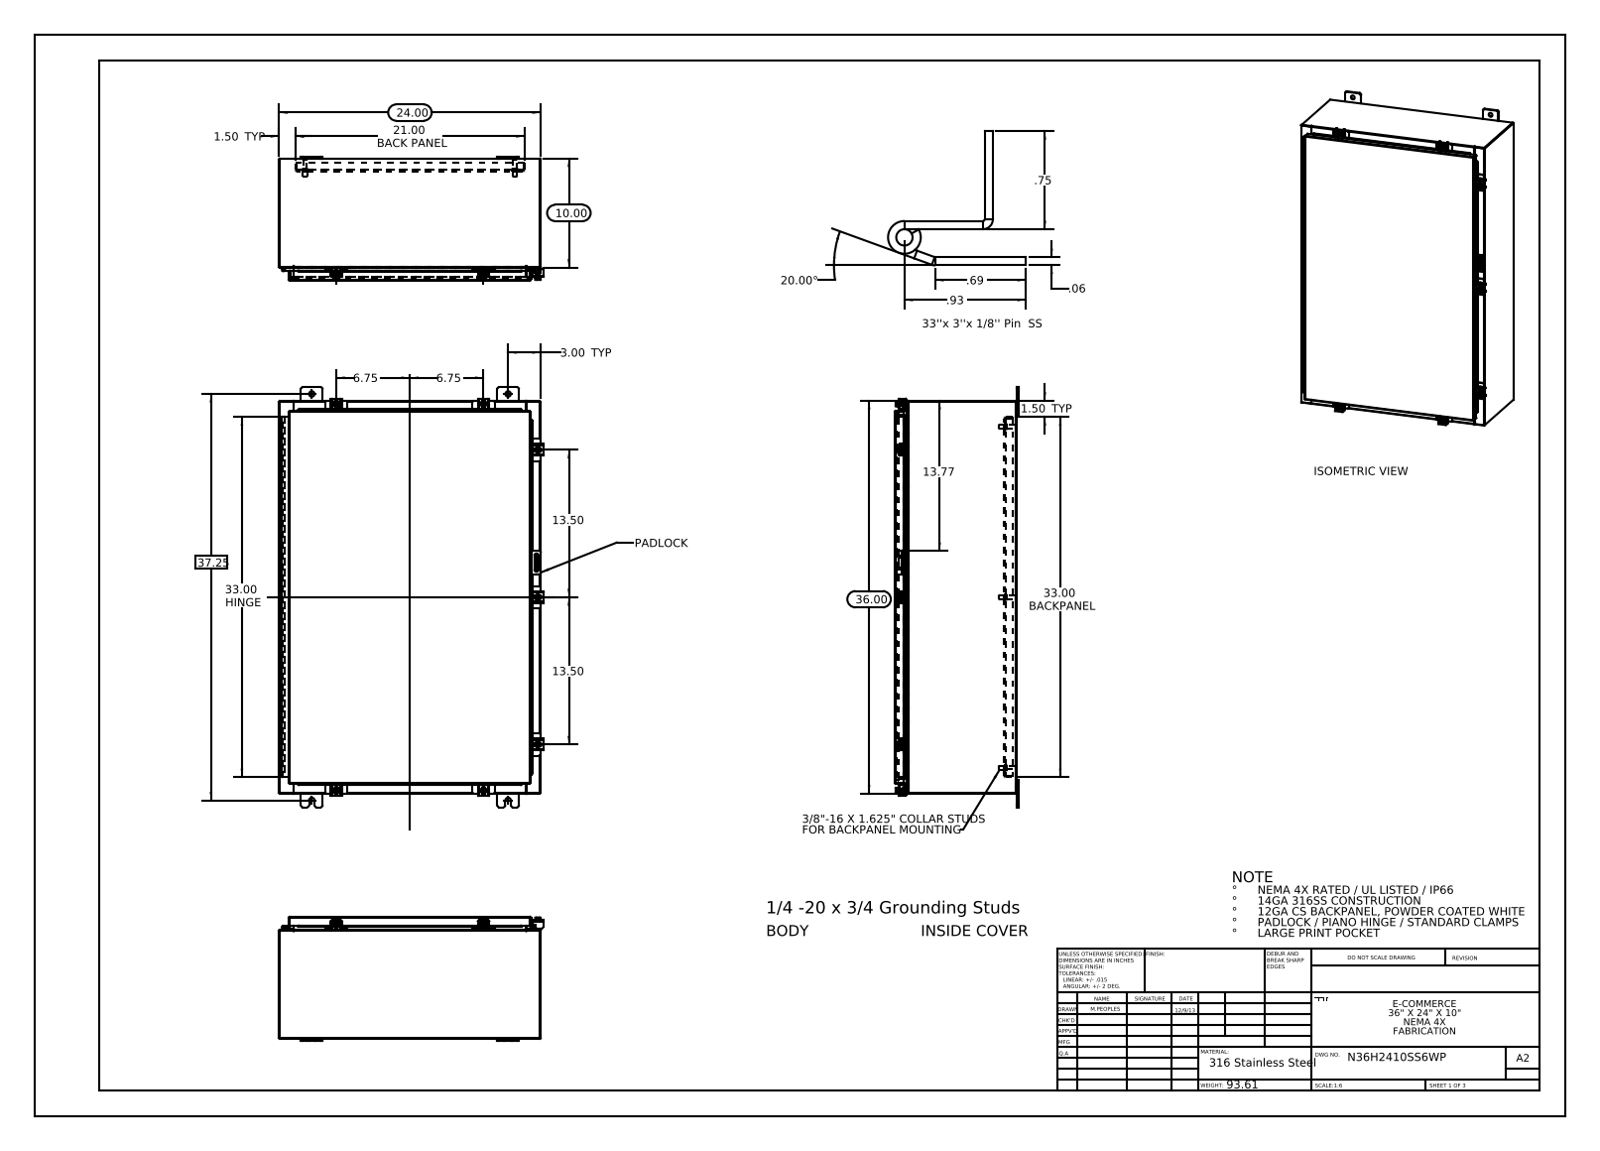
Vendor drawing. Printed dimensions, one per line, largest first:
37.25
36.00
33.00 HINGE
33.00 BACKPANEL
24.00
21.00 BACK PANEL
20.00°
13.77
13.50
13.50
10.00
6.75
6.75
3.00 TYP
1.50 TYP
1.50 TYP
.93
.75
.69
.06
